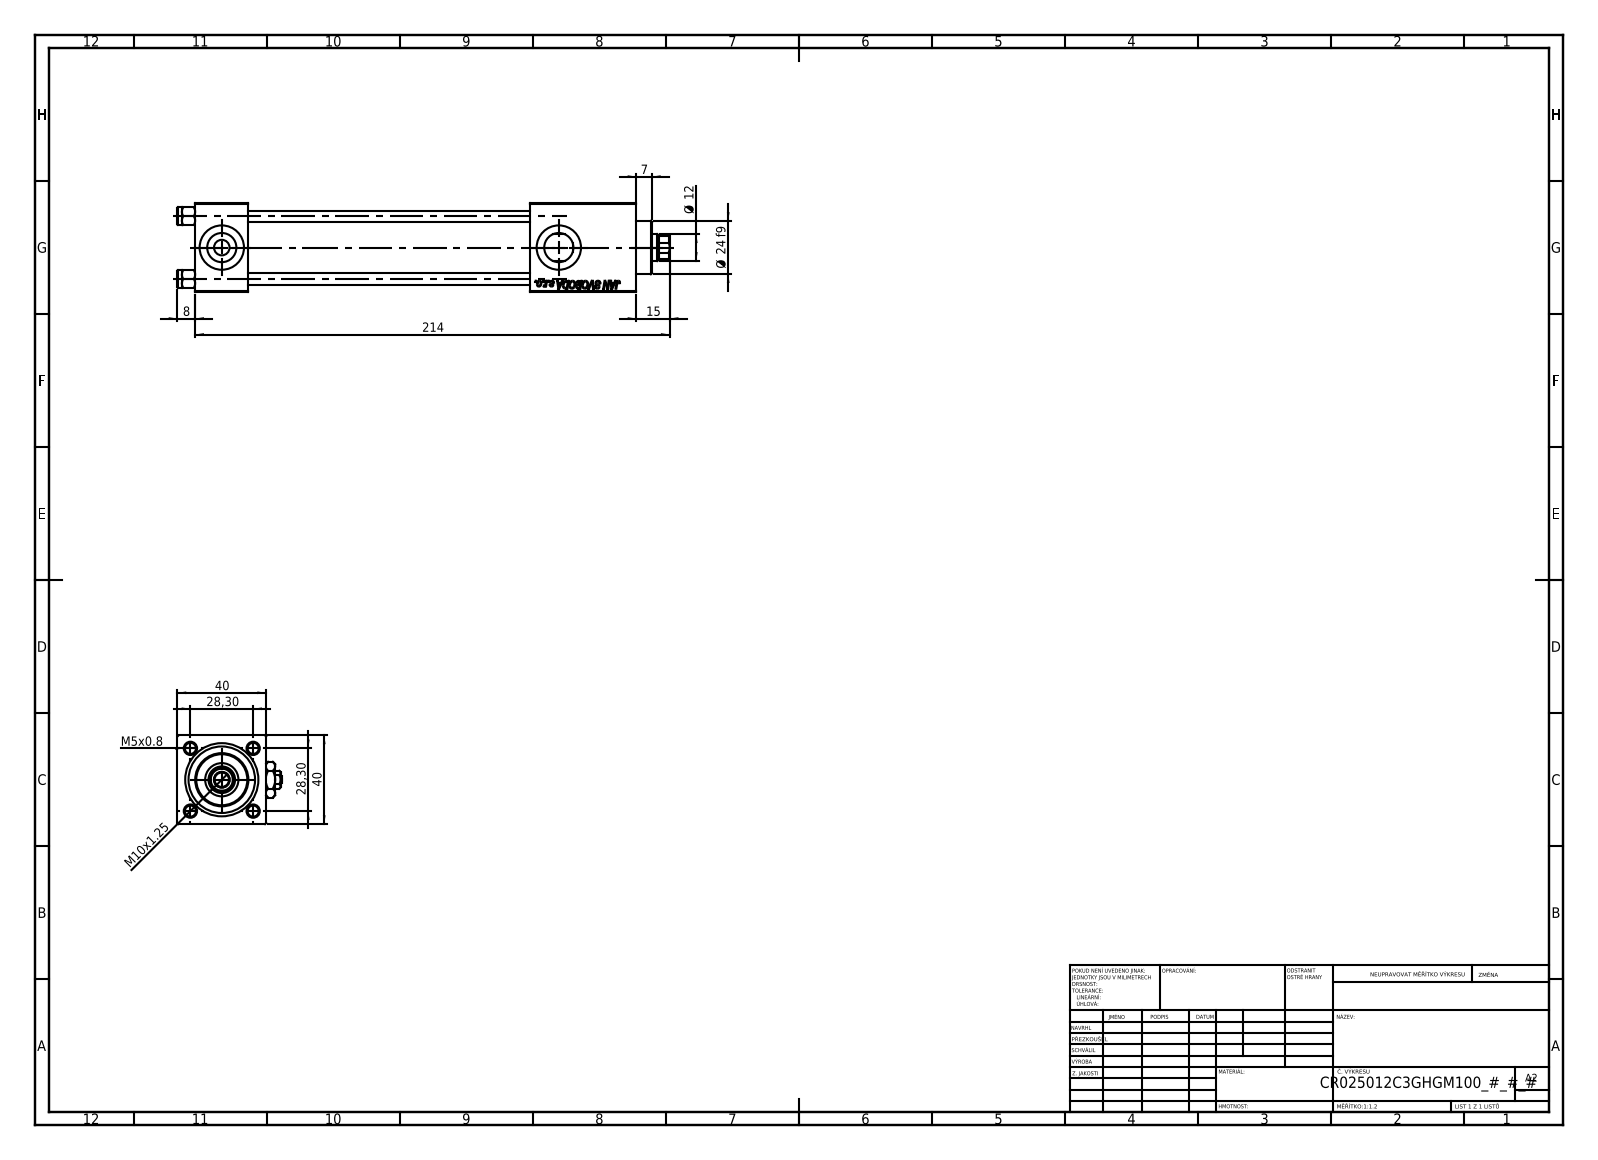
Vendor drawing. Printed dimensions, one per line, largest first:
214
40
40
28,30
28,30
Ø 24 f9
15
Ø 12
M10x1.25
8
7
M5x0.8
